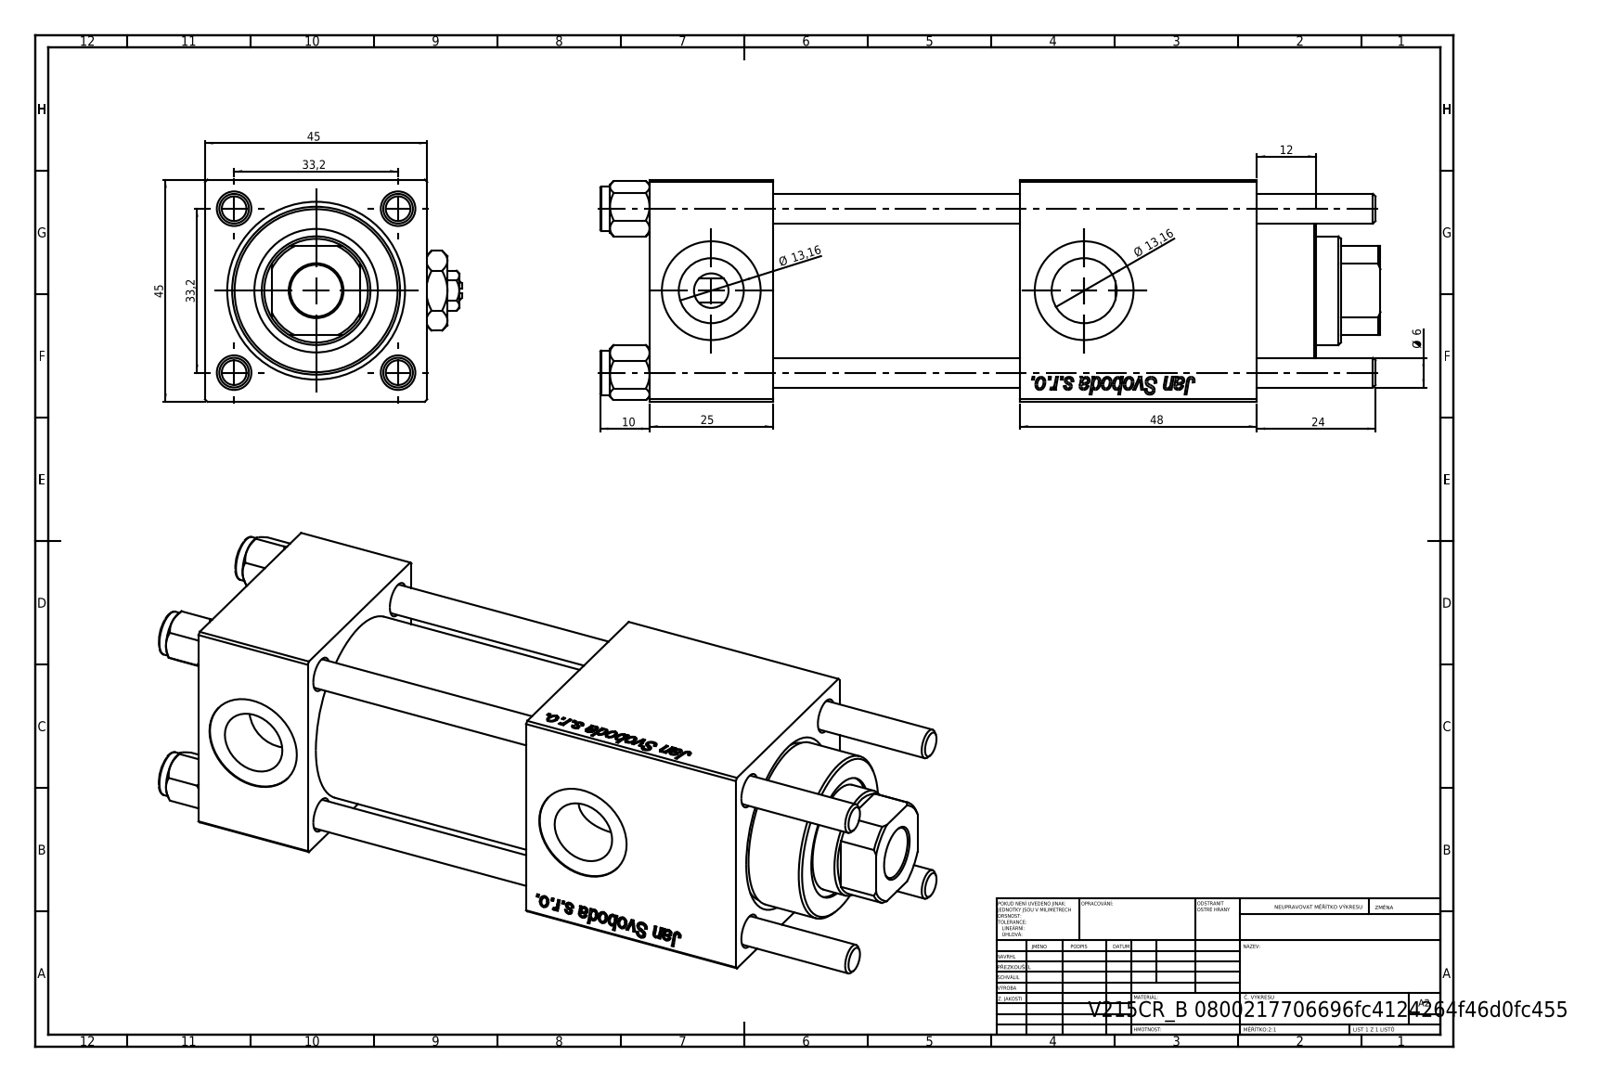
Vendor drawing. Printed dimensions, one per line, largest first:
48
45
45
33,2
33,2
25
24
Ø 13,16
Ø 13,16
12
10
Ø 6
